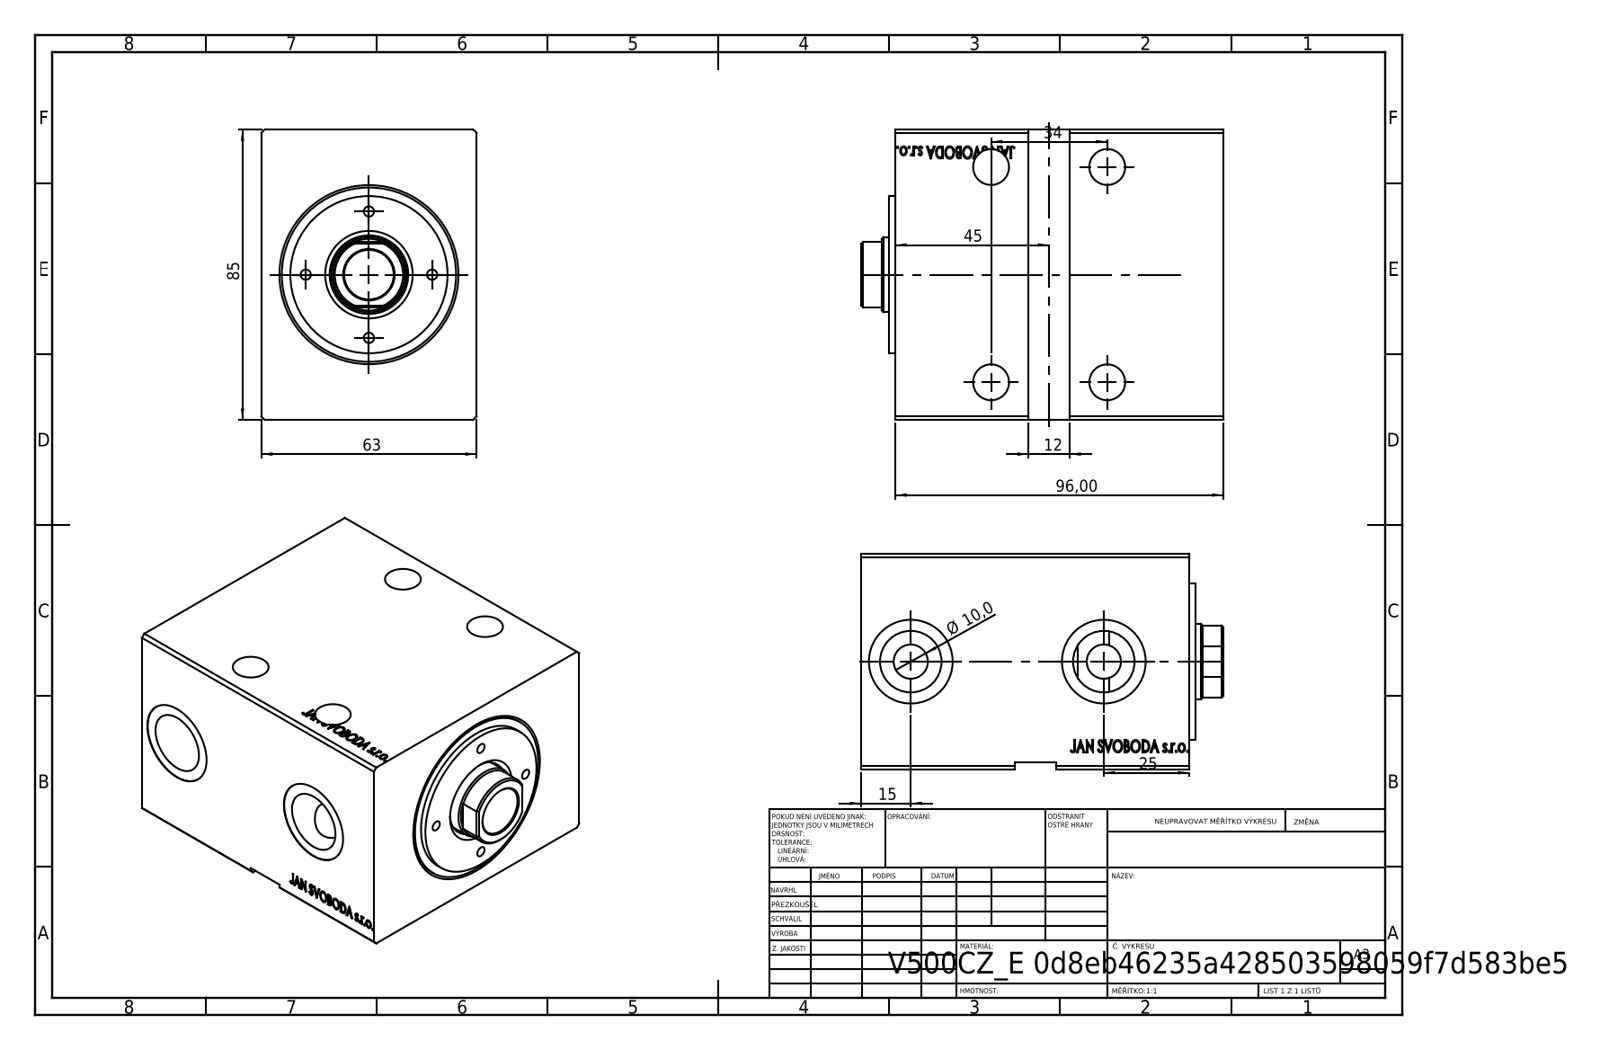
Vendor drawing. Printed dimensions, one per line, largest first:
96,00
85
63
45
34
25
15
12
Ø 10,0
